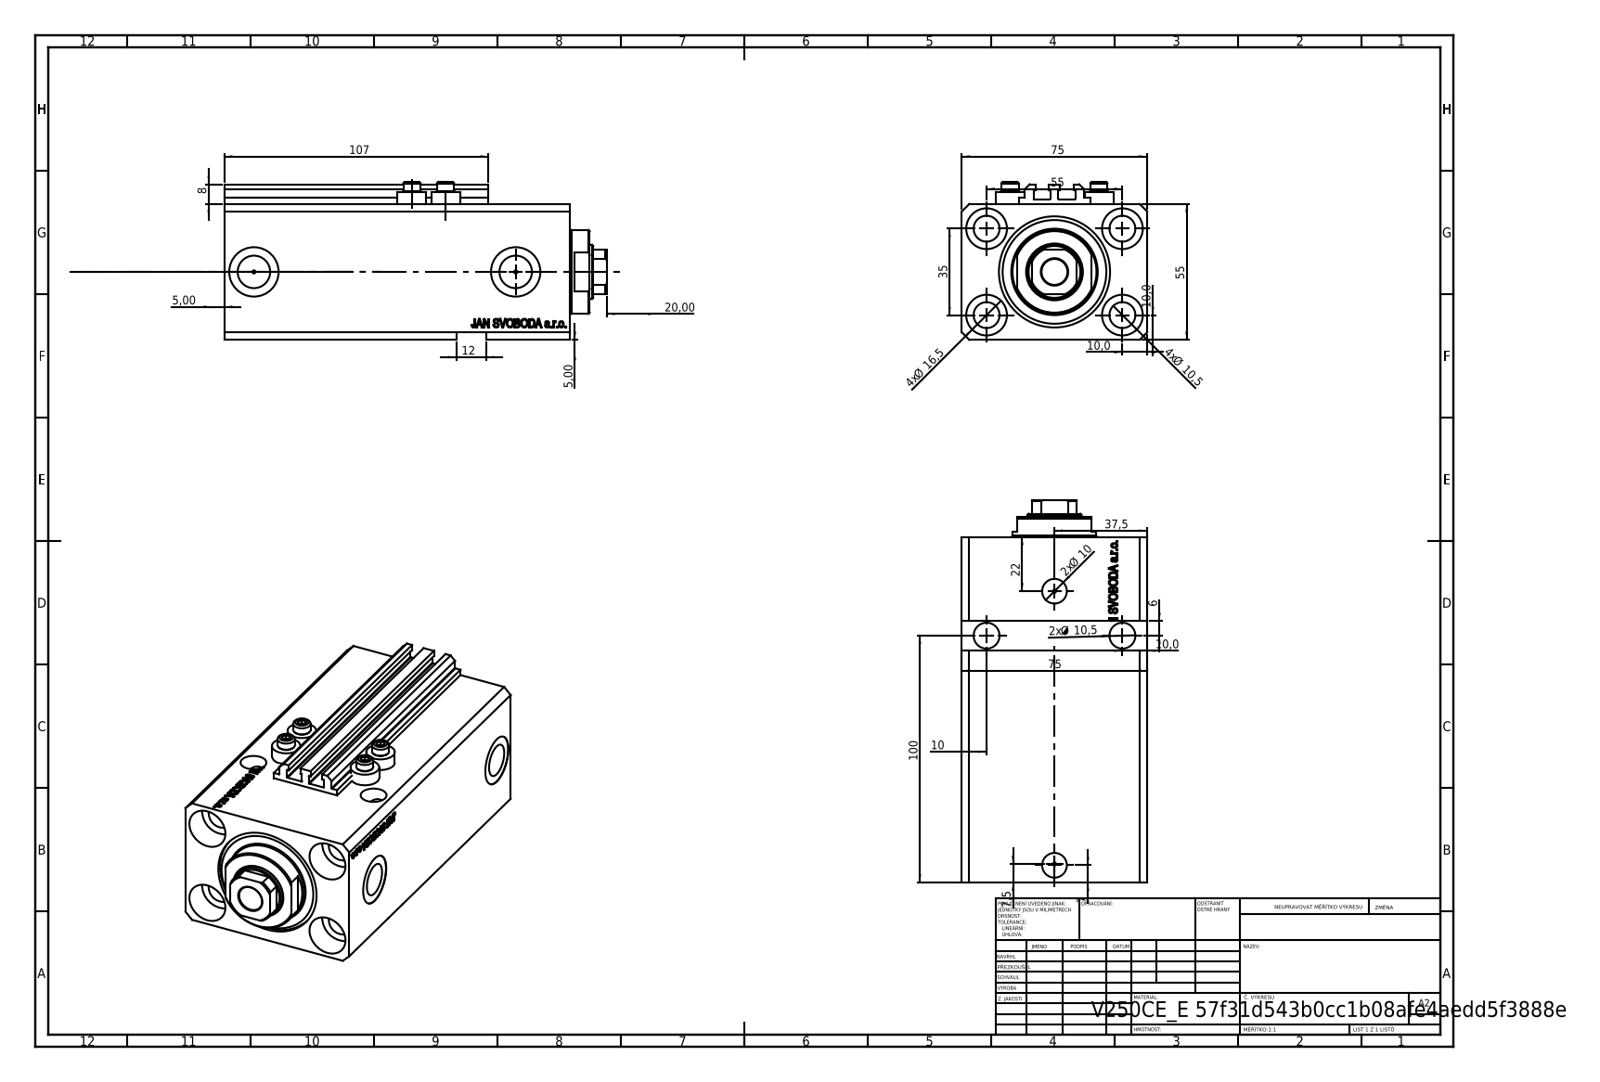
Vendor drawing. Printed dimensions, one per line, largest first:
107
100
75
75
55
55
37,5
35
22
20,00
4x Ø 16,5
12
4x Ø 10,5
2x Ø 10,5
10,0
10,0
2x Ø 10
10,0
10
8
7,5
7
6
5,00
5,00
